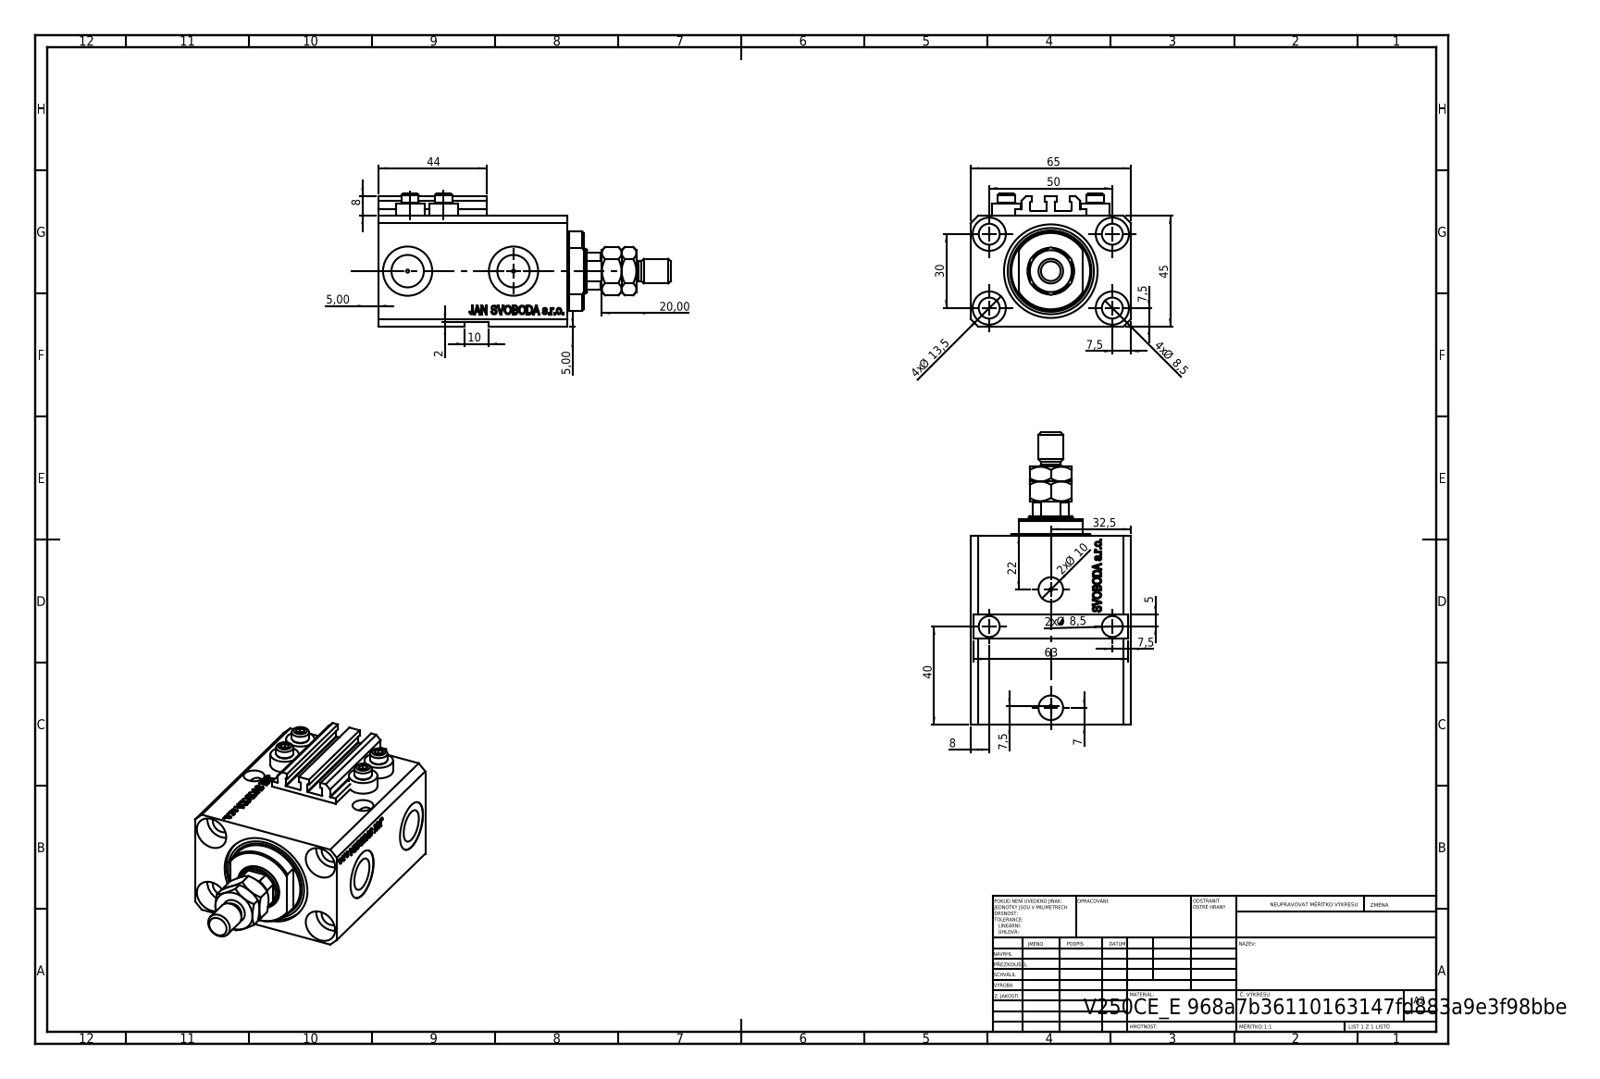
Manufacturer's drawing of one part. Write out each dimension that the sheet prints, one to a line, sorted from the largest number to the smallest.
65
63
50
45
44
40
32,5
30
22
20,00
4x Ø 13,5
10
2x Ø 10
4x Ø 8,5
2x Ø 8,5
8
8
7,5
7,5
7,5
7,5
7
5,00
5,00
5
2
